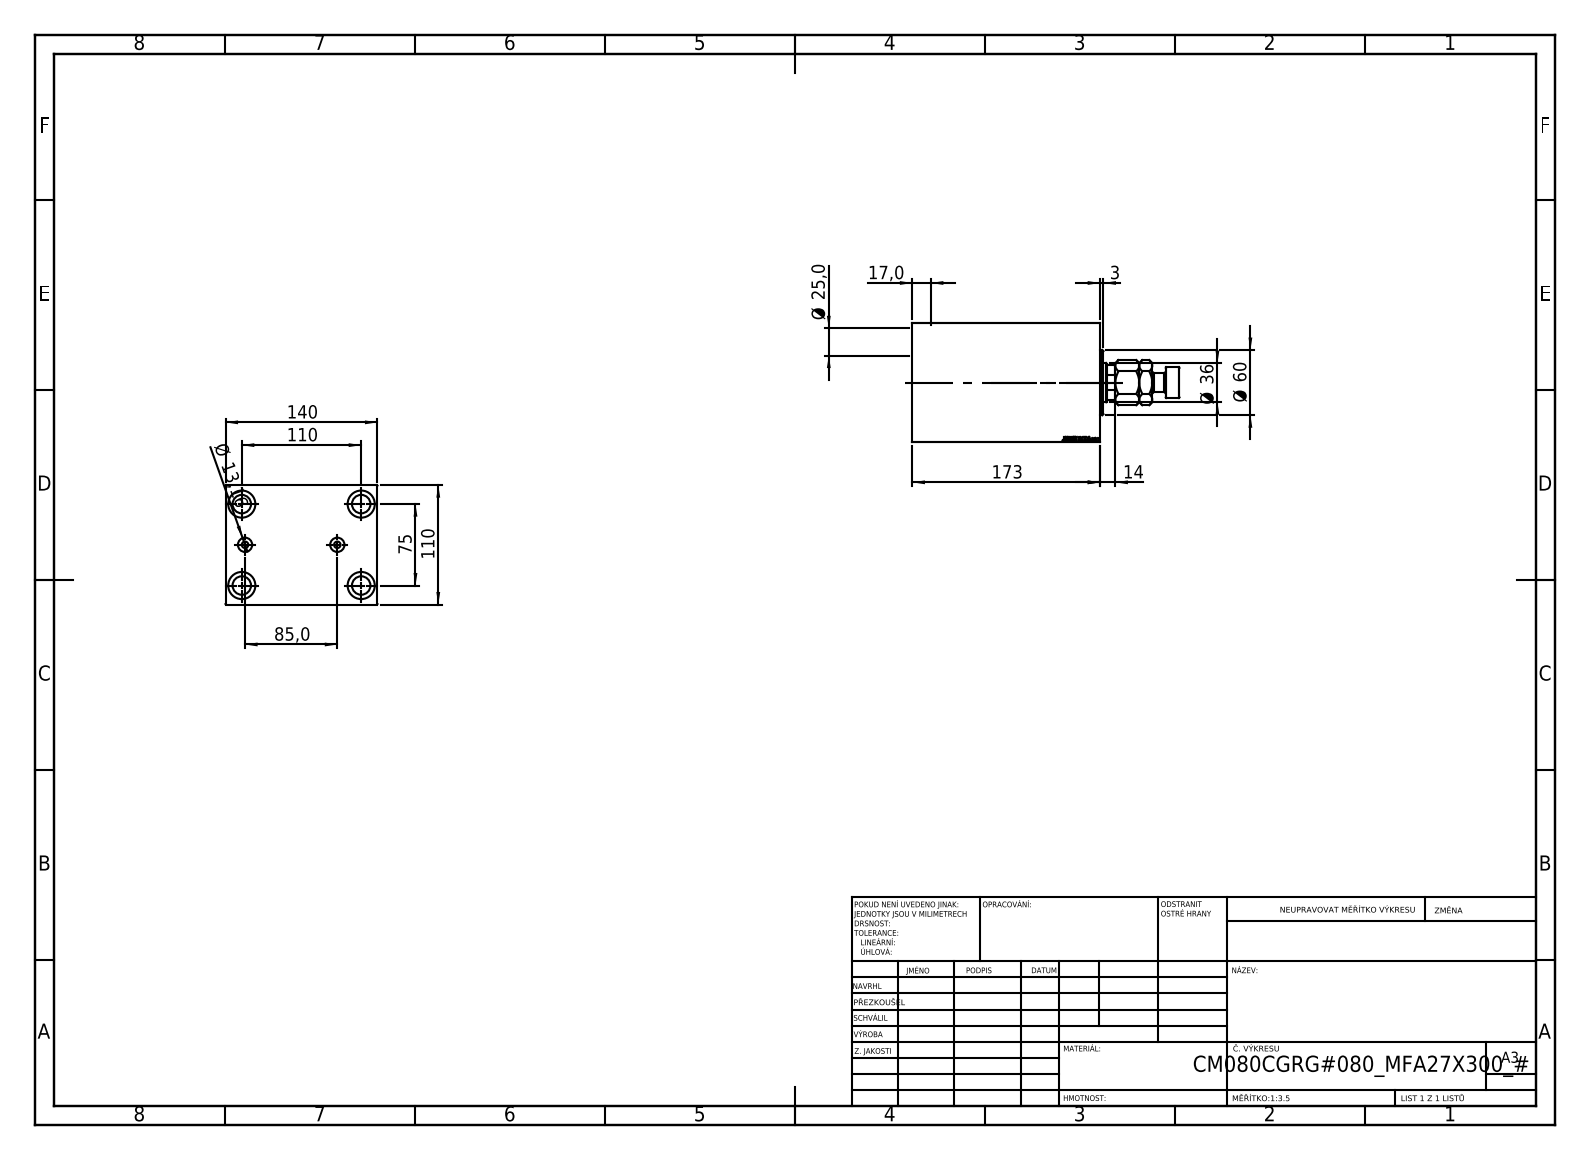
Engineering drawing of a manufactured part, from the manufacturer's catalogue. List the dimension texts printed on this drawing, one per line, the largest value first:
173
140
110
110
85,0
75
Ø 60
Ø 36
Ø 25,0
17,0
14
Ø 13,16
3
